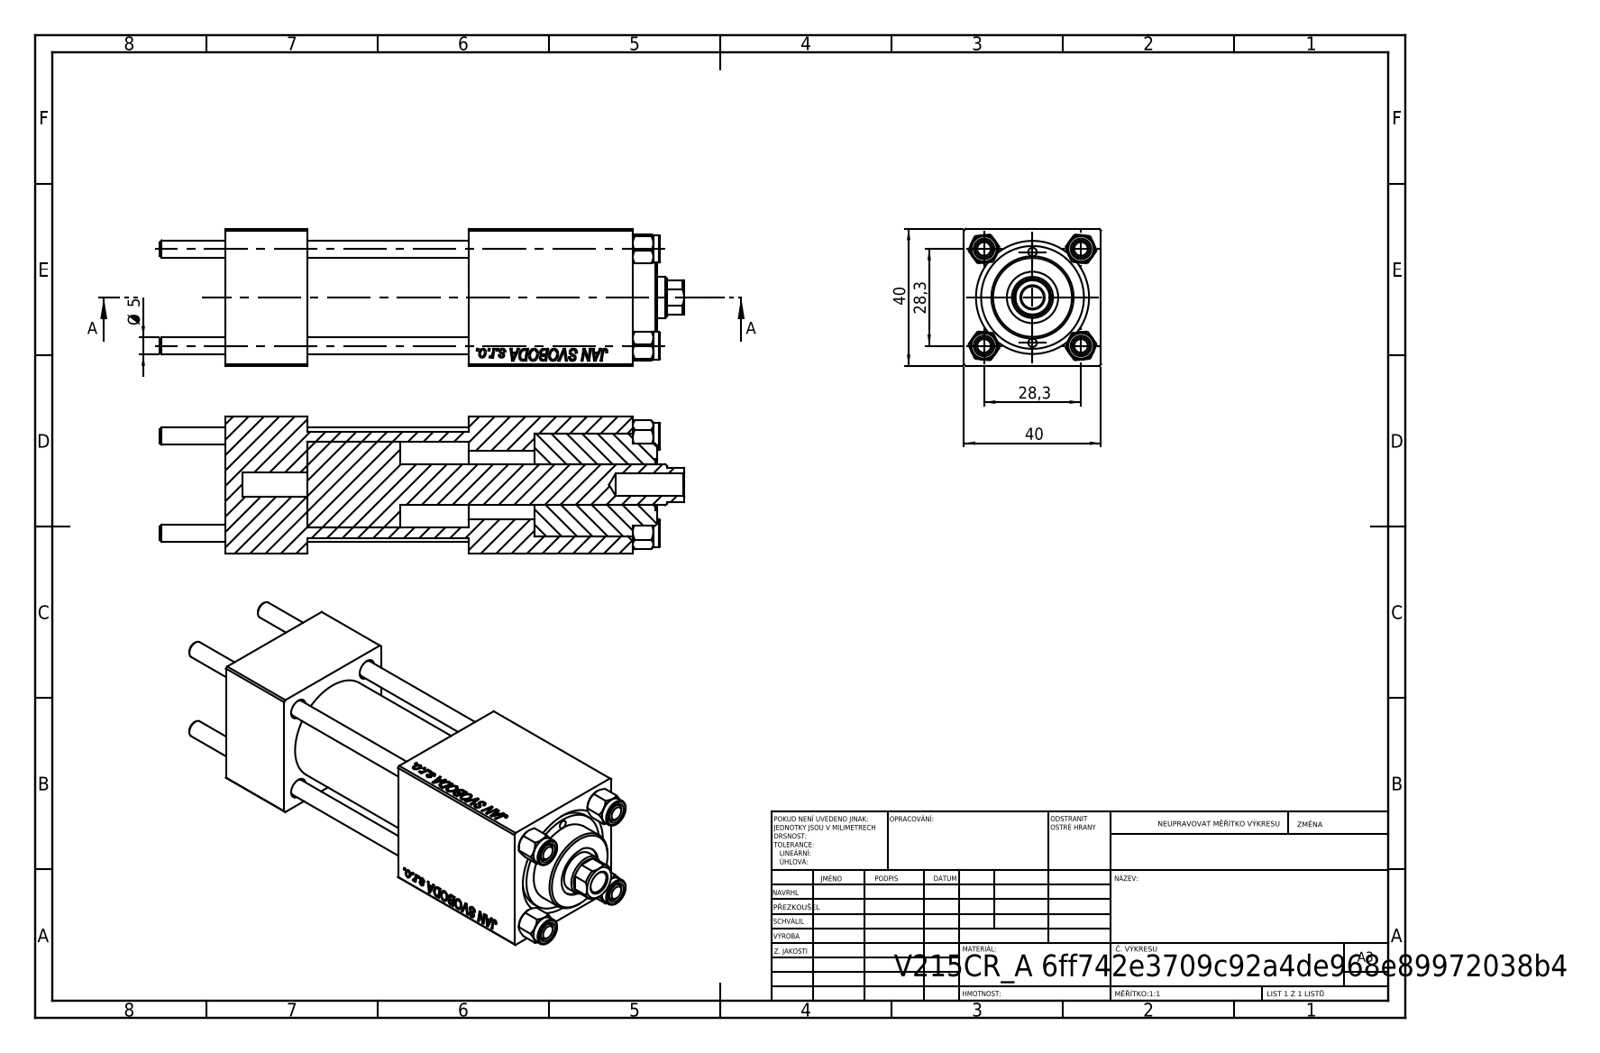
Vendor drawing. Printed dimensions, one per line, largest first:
40
40
28,3
28,3
Ø 5
